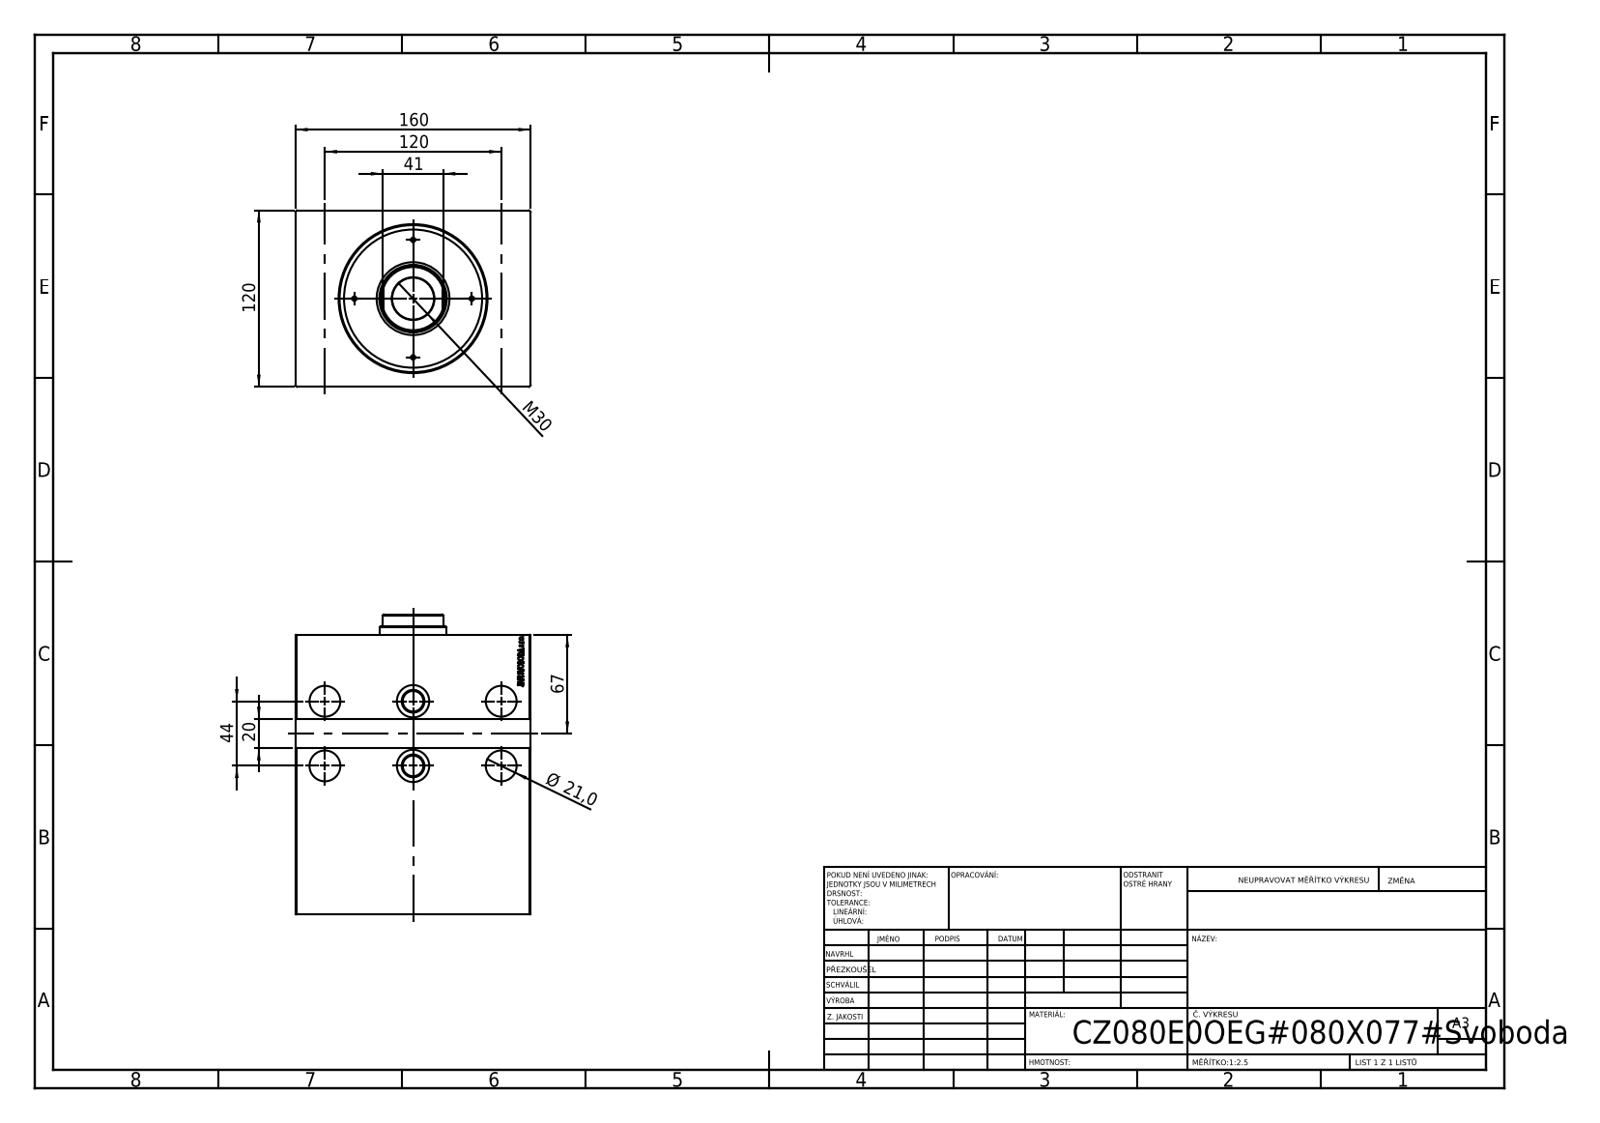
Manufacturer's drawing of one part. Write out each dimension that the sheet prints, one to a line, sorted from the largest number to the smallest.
160
120
120
67
44
41
M30
Ø 21,0
20
